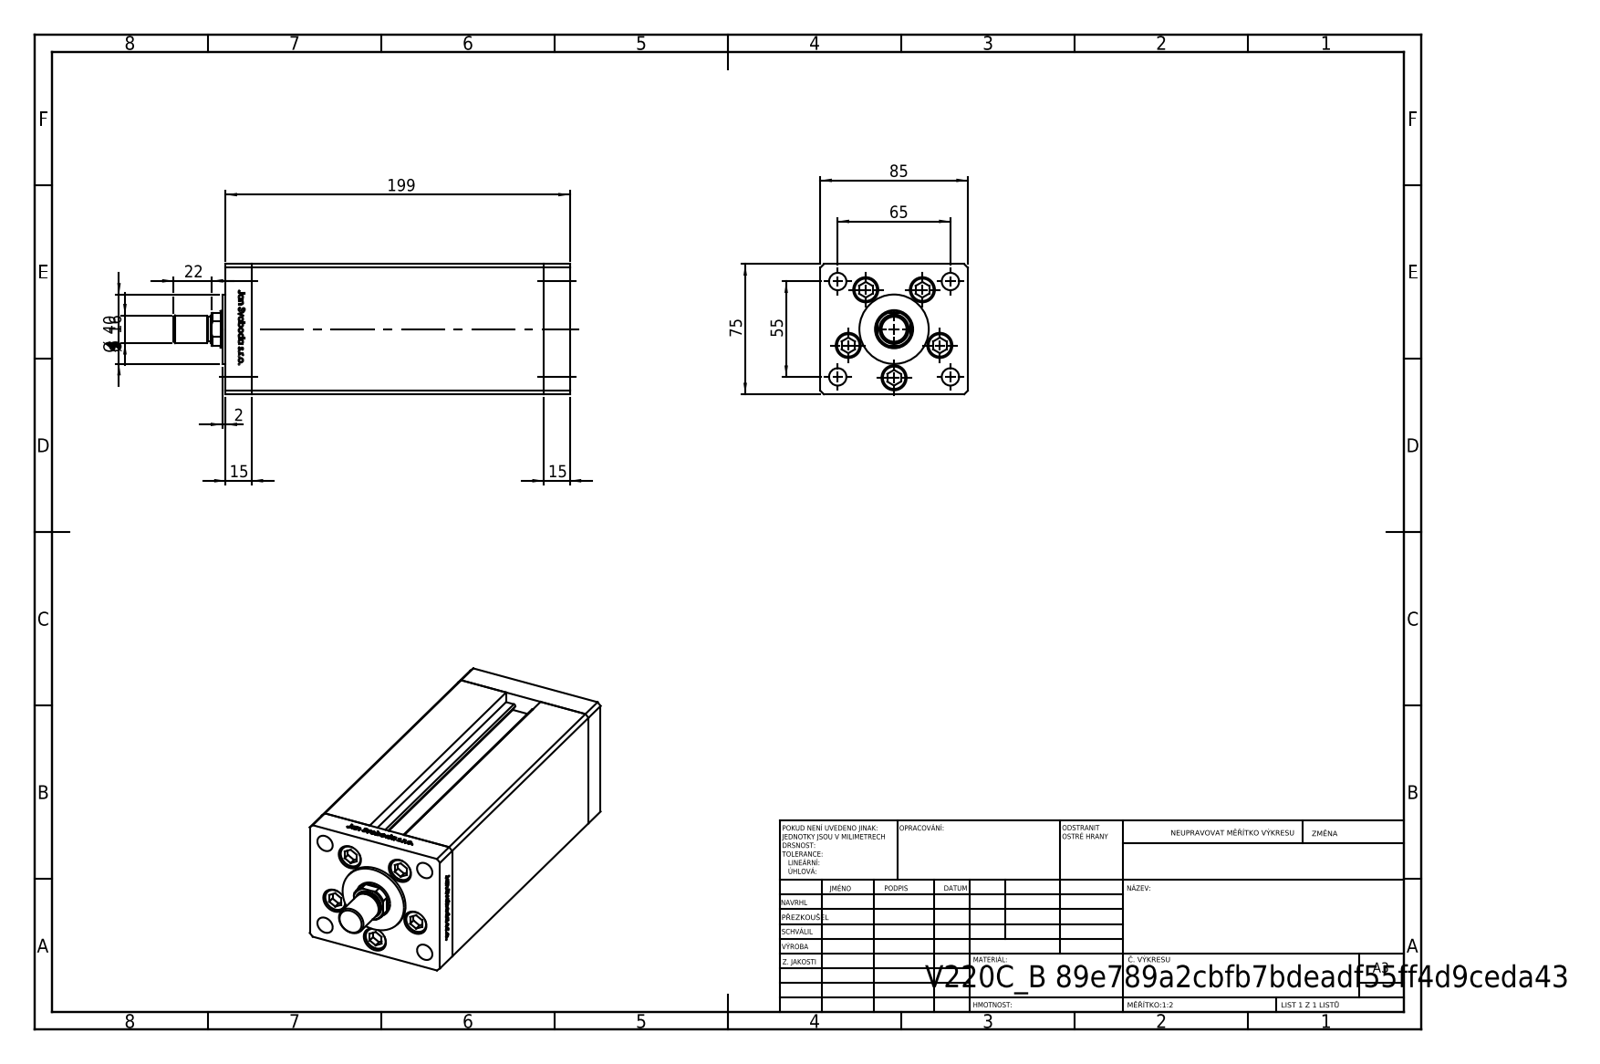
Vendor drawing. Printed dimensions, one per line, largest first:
199
85
75
65
55
Ø 40
22
Ø 16
15
15
2
